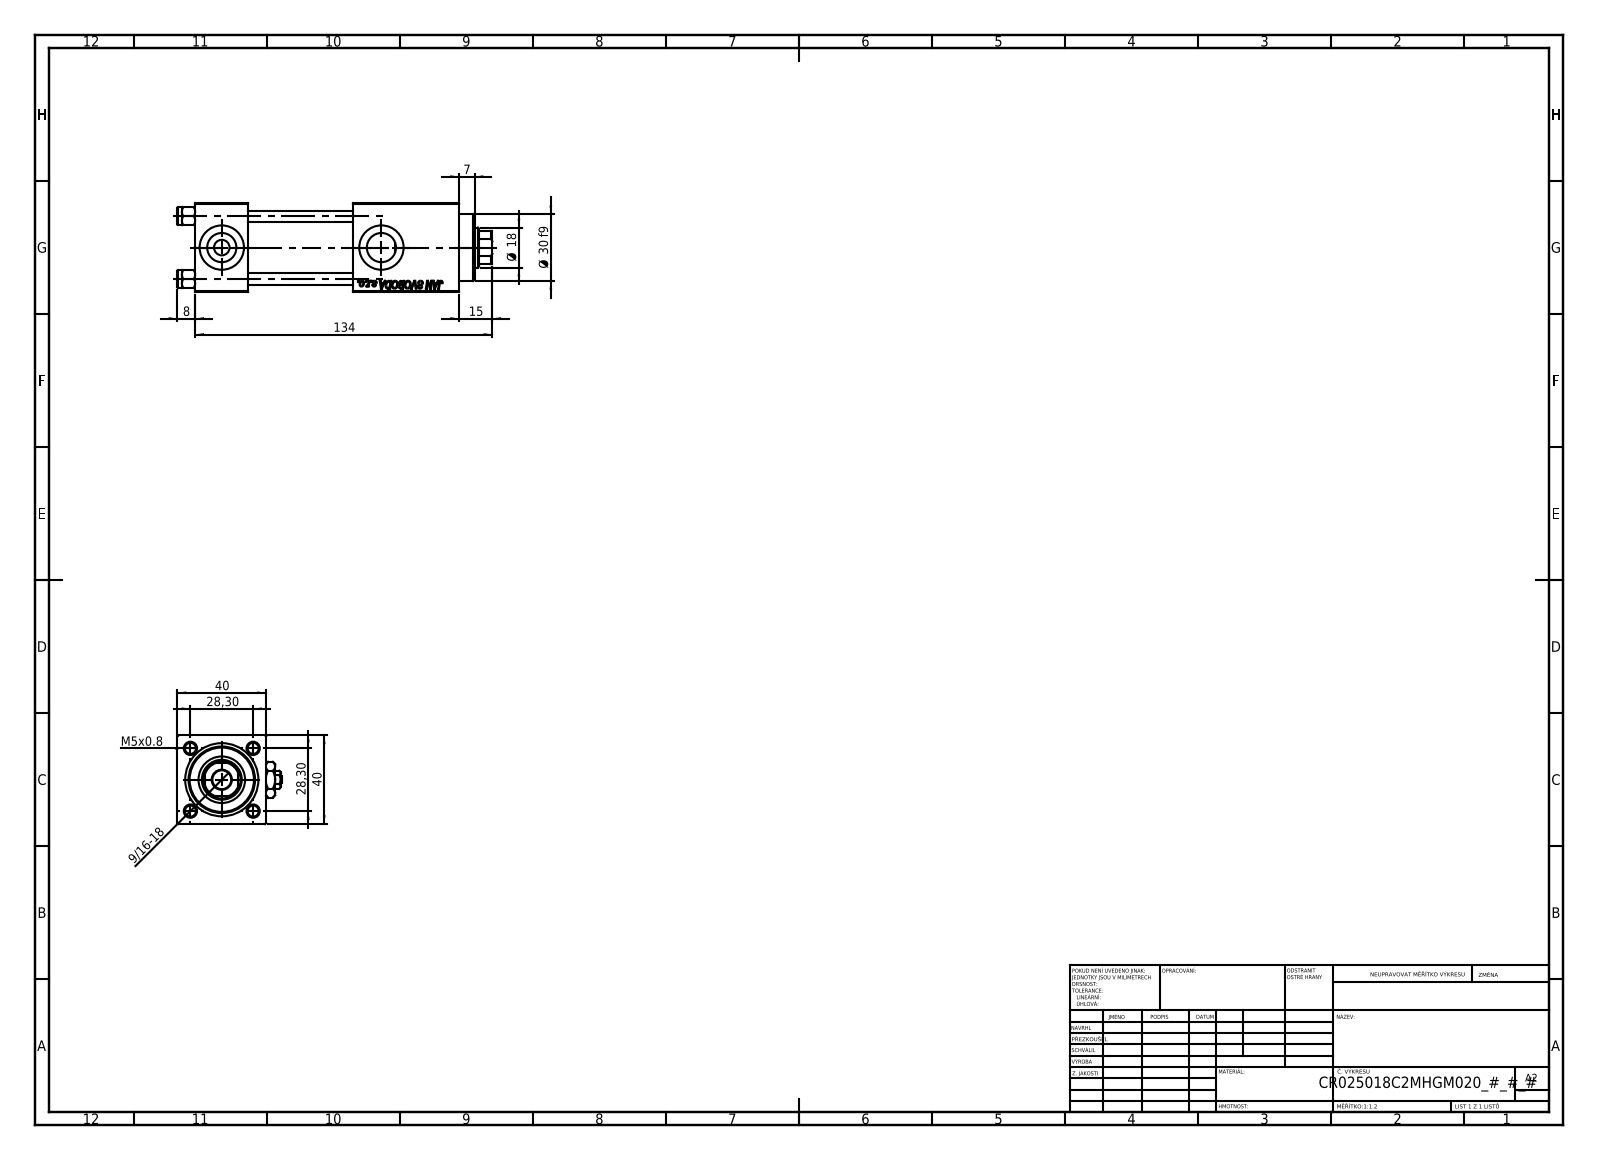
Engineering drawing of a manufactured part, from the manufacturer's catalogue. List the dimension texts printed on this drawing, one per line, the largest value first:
134
40
40
Ø 30 f9
28,30
28,30
Ø 18
15
8
7
M5x0.8
9/16-18
